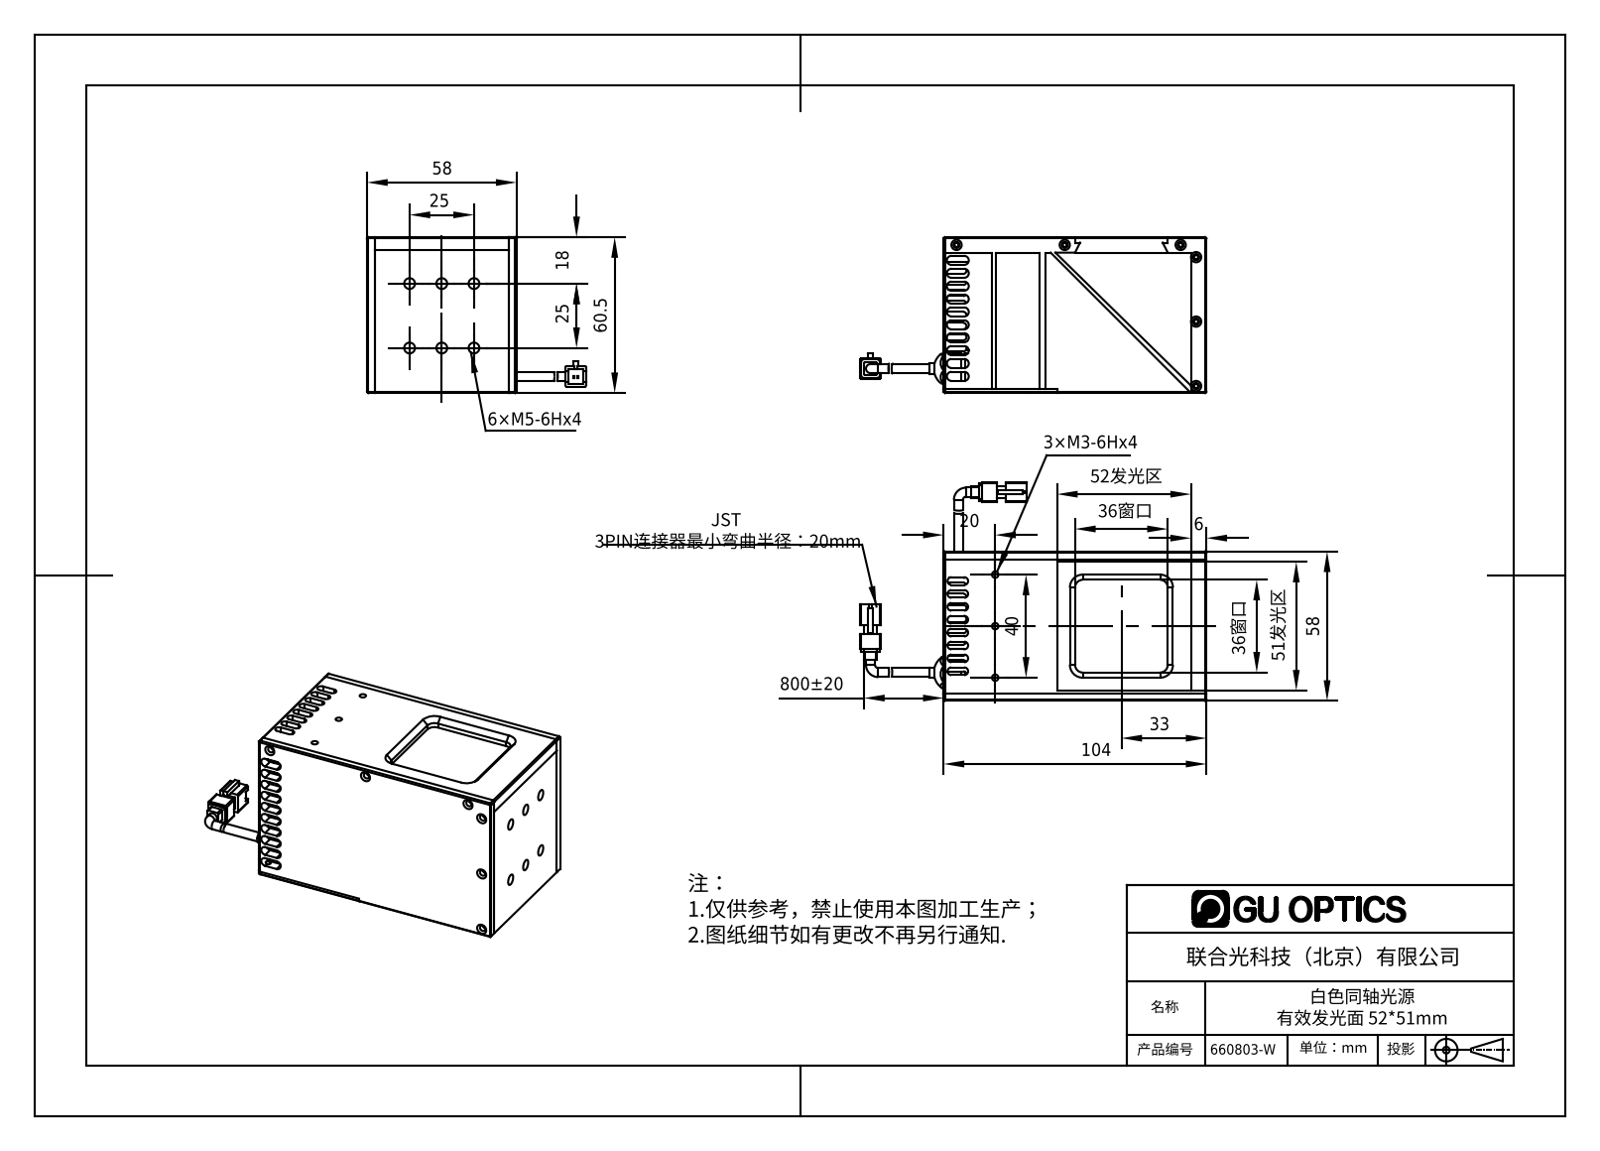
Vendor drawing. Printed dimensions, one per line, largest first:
800±20
104
60.5
58
58
52发光区
51发光区
40
36窗口
36窗口
33
25
25
20
18
6
